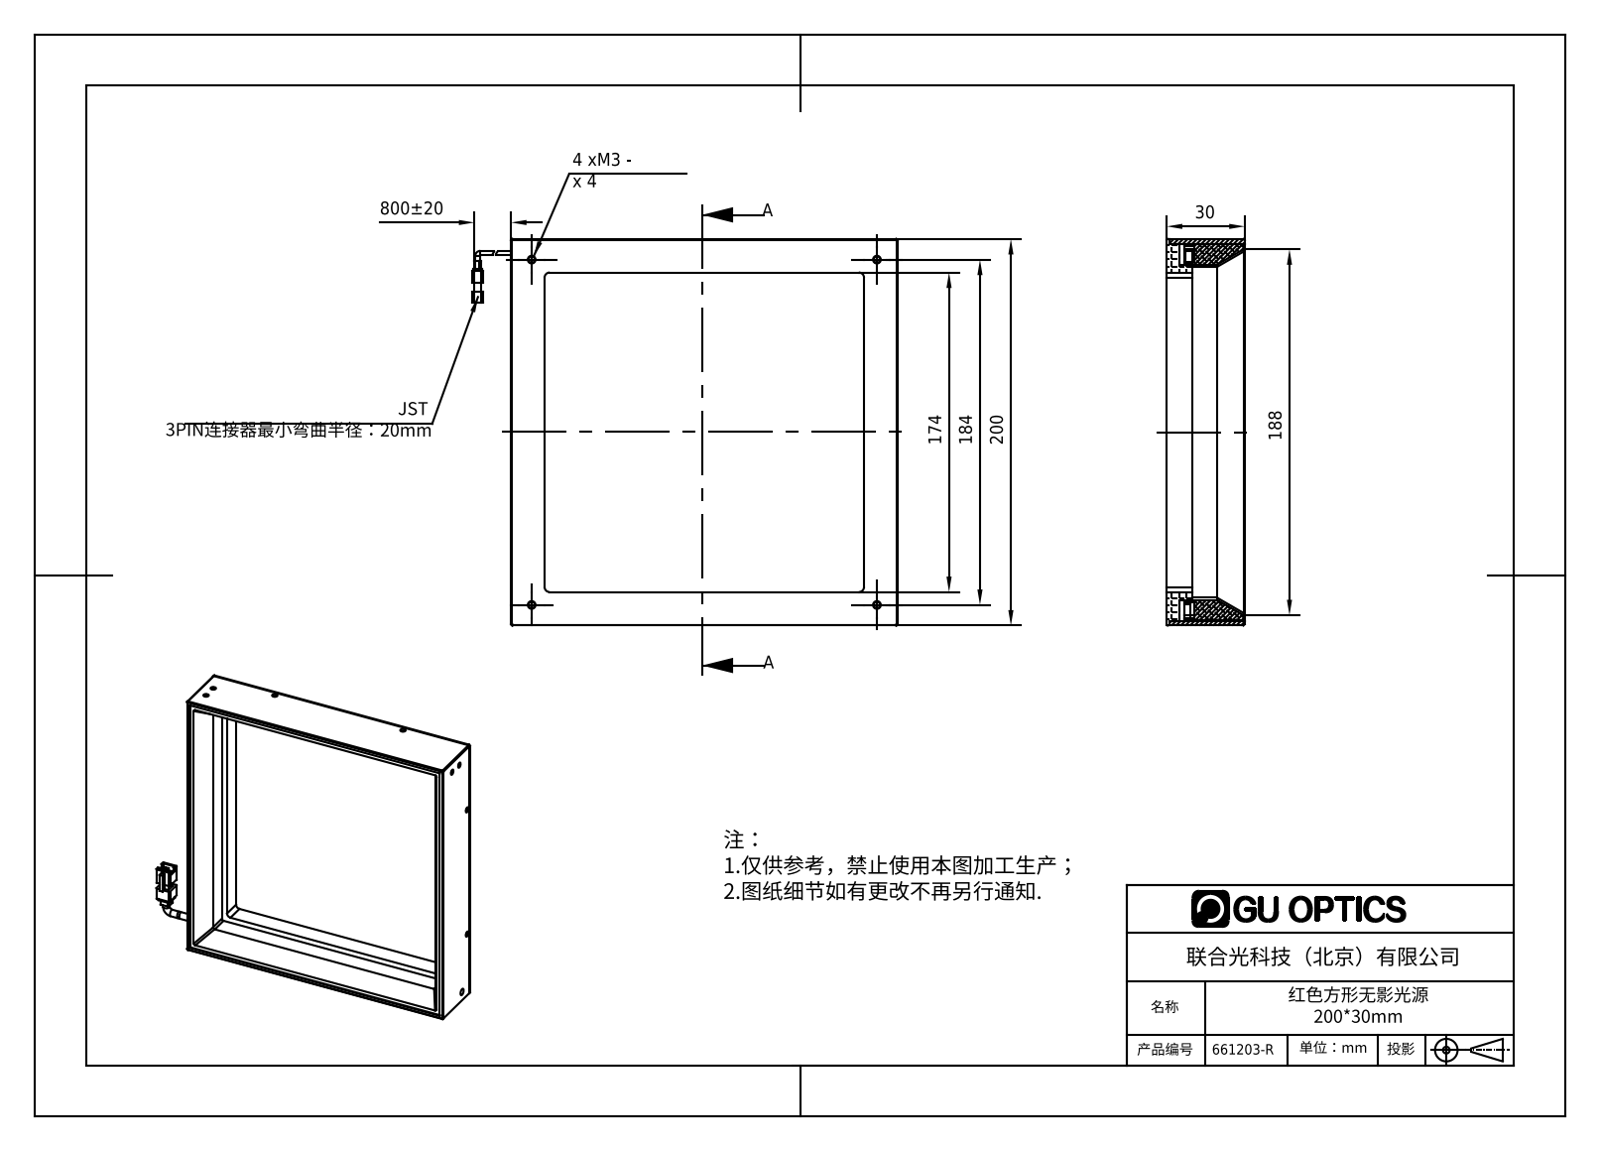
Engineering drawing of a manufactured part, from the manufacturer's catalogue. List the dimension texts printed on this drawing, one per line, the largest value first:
800±20
200
188
184
174
30
